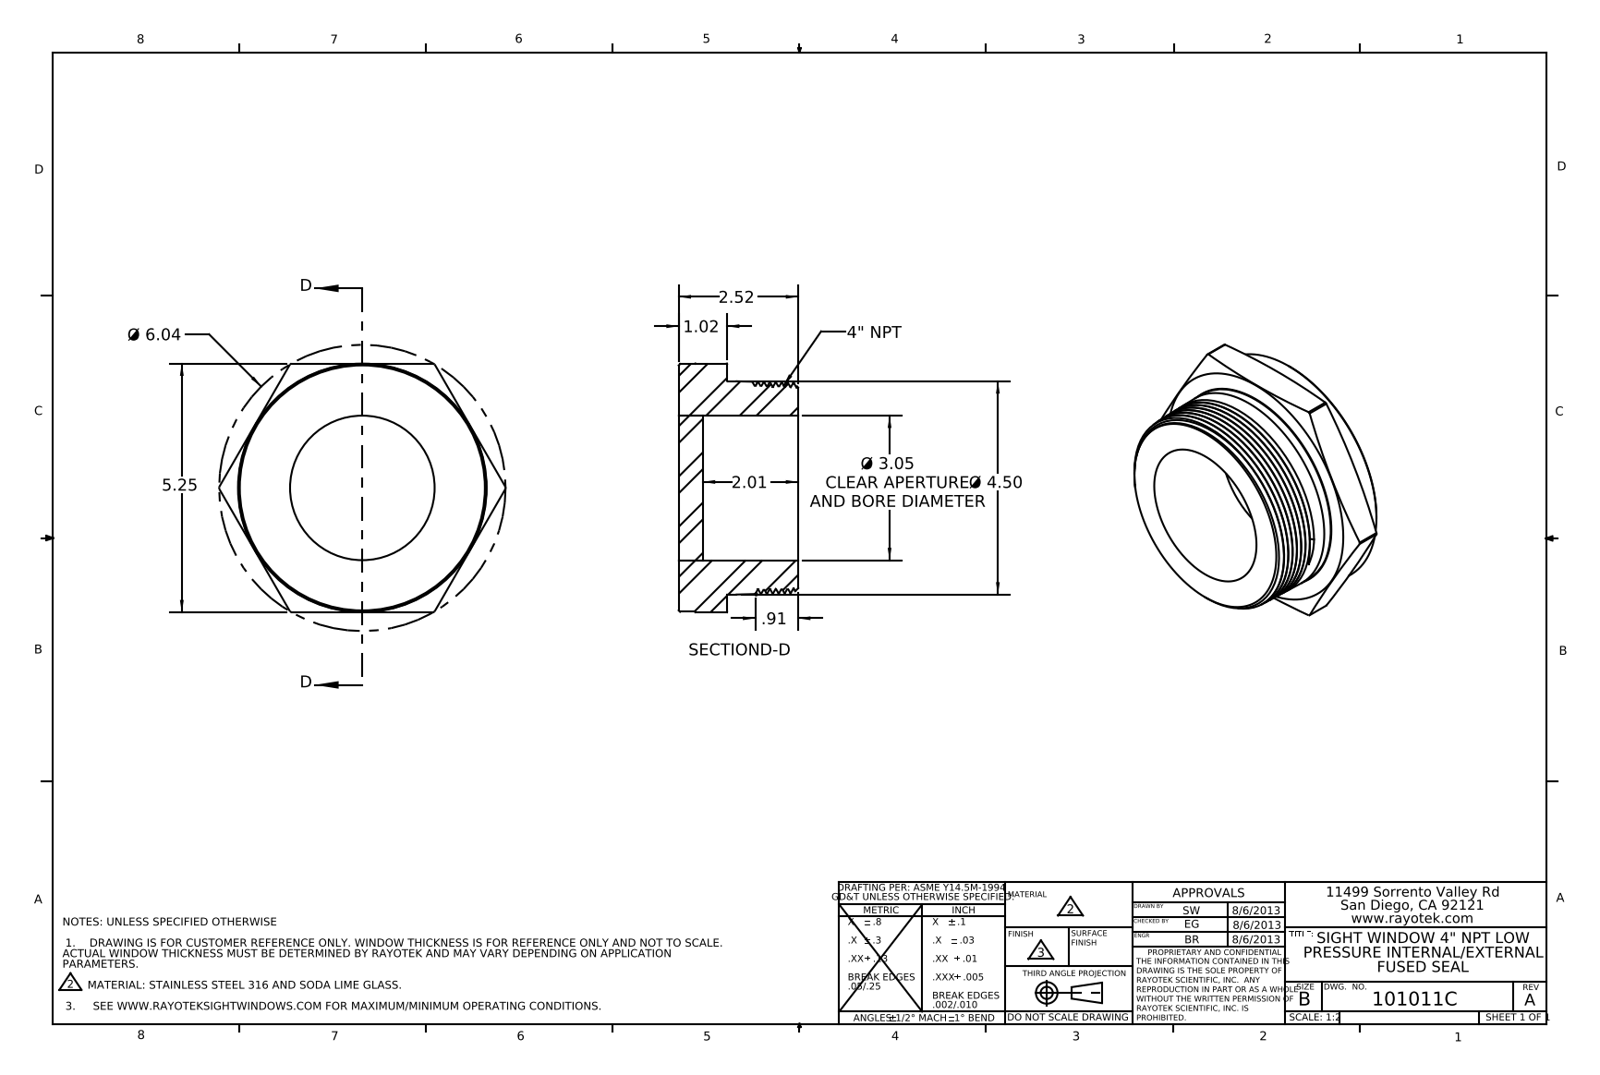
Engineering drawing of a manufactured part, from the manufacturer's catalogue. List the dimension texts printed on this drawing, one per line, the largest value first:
Ø 6.04
5.25
Ø 4.50
Ø 3.05 CLEAR APERTURE AND BORE DIAMETER
2.52
2.01
1.02
.91
